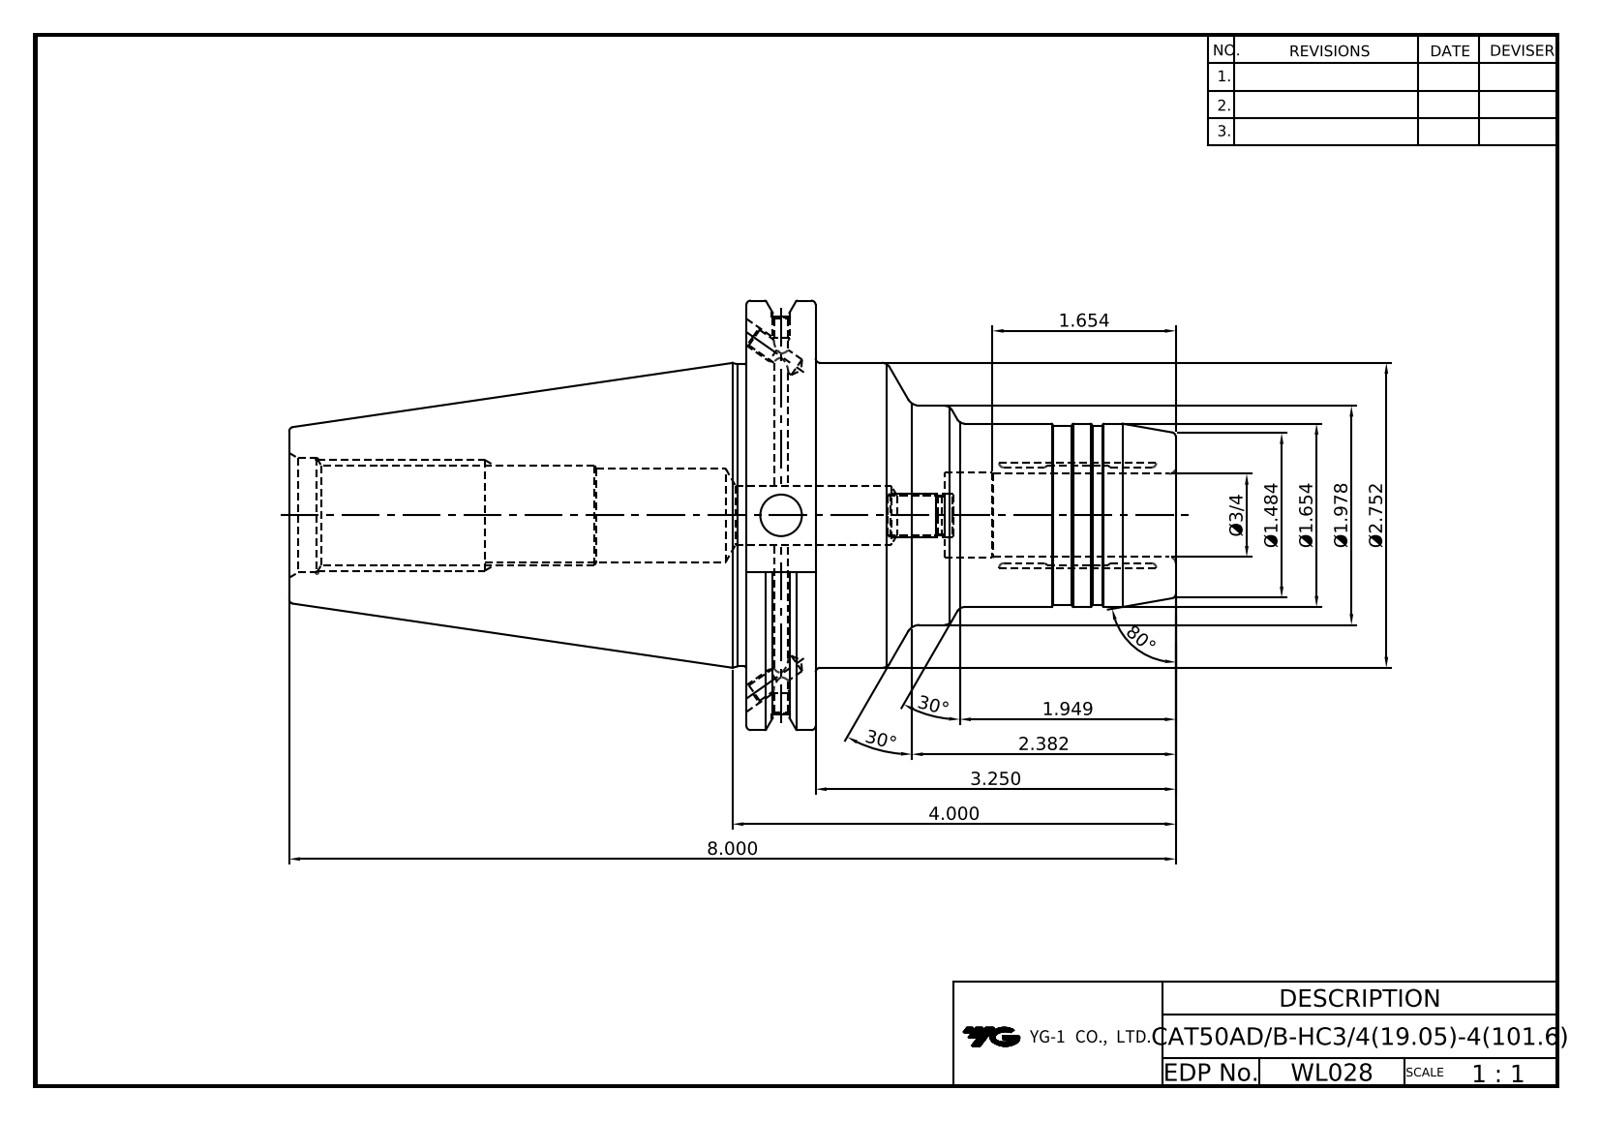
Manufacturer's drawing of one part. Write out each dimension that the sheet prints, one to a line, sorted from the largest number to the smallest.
80°
30°
30°
8.000
4.000
3.250
Ø2.752
2.382
Ø1.978
1.949
Ø1.654
1.654
Ø1.484
Ø3/4
